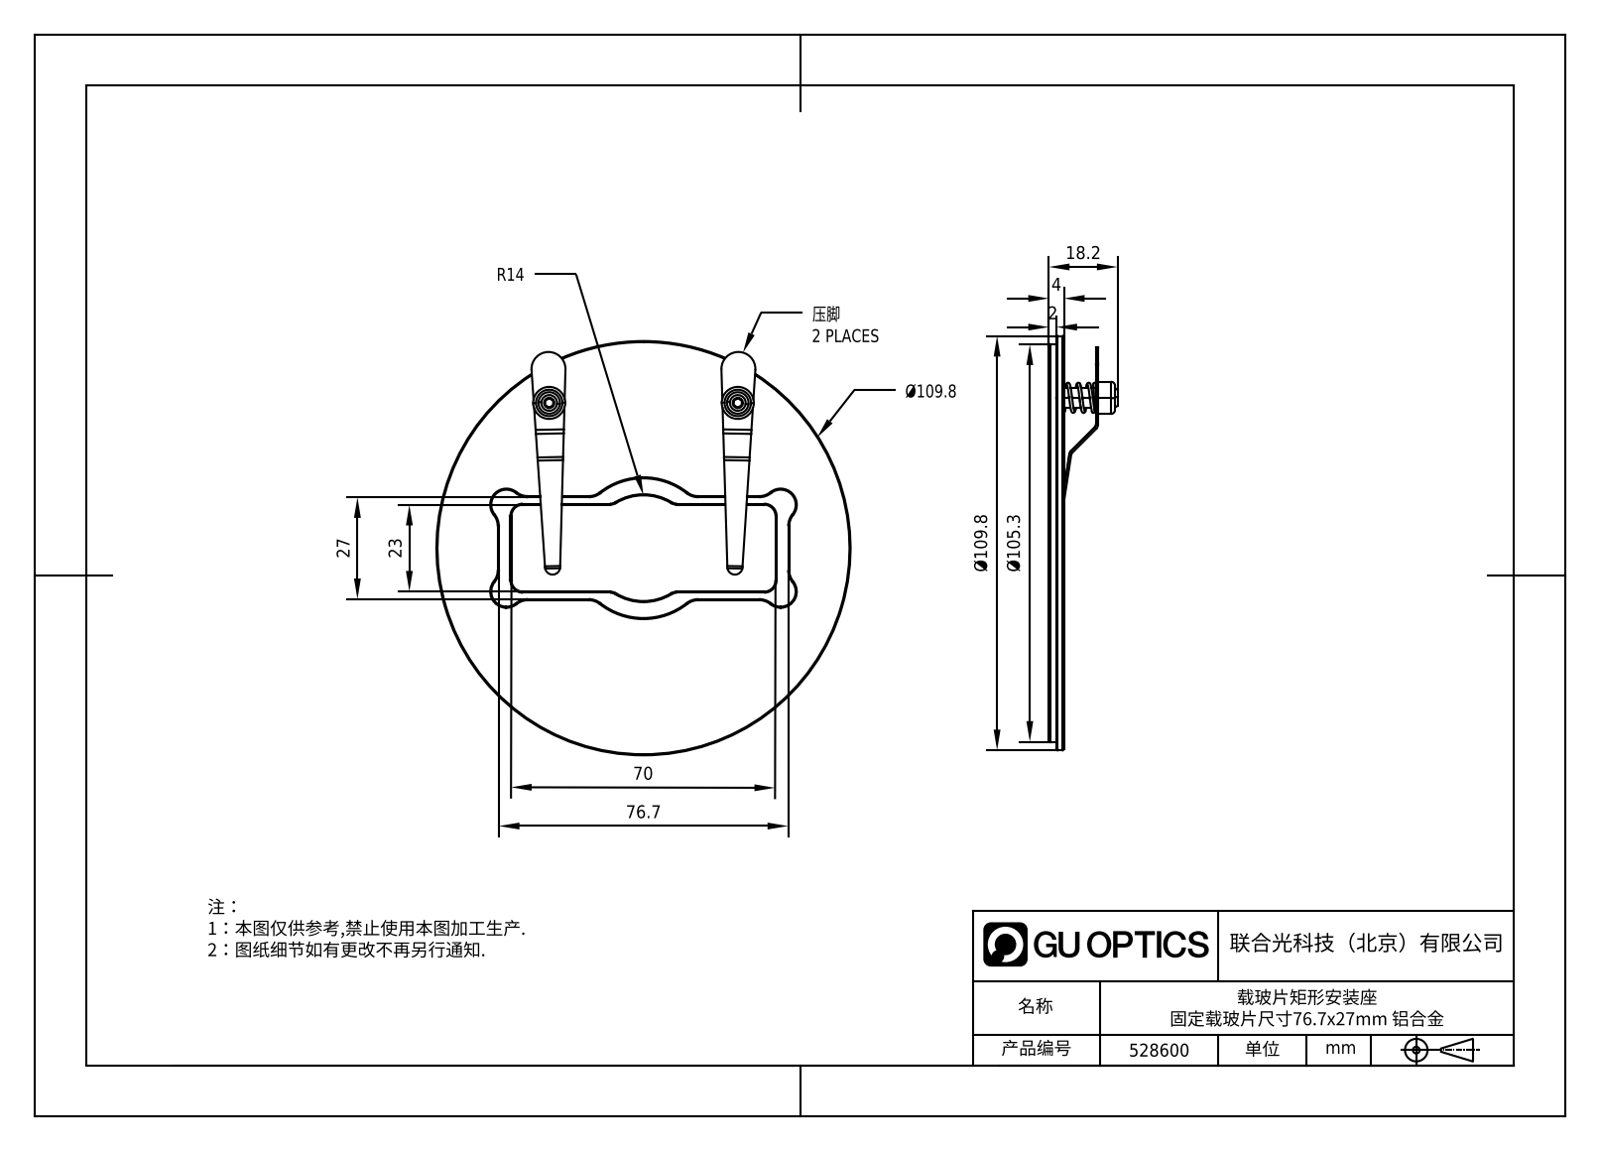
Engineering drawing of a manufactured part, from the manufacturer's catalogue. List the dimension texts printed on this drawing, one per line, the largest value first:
Ø109.8
Ø105.3
76.7
70
27
23
18.2
4
2
